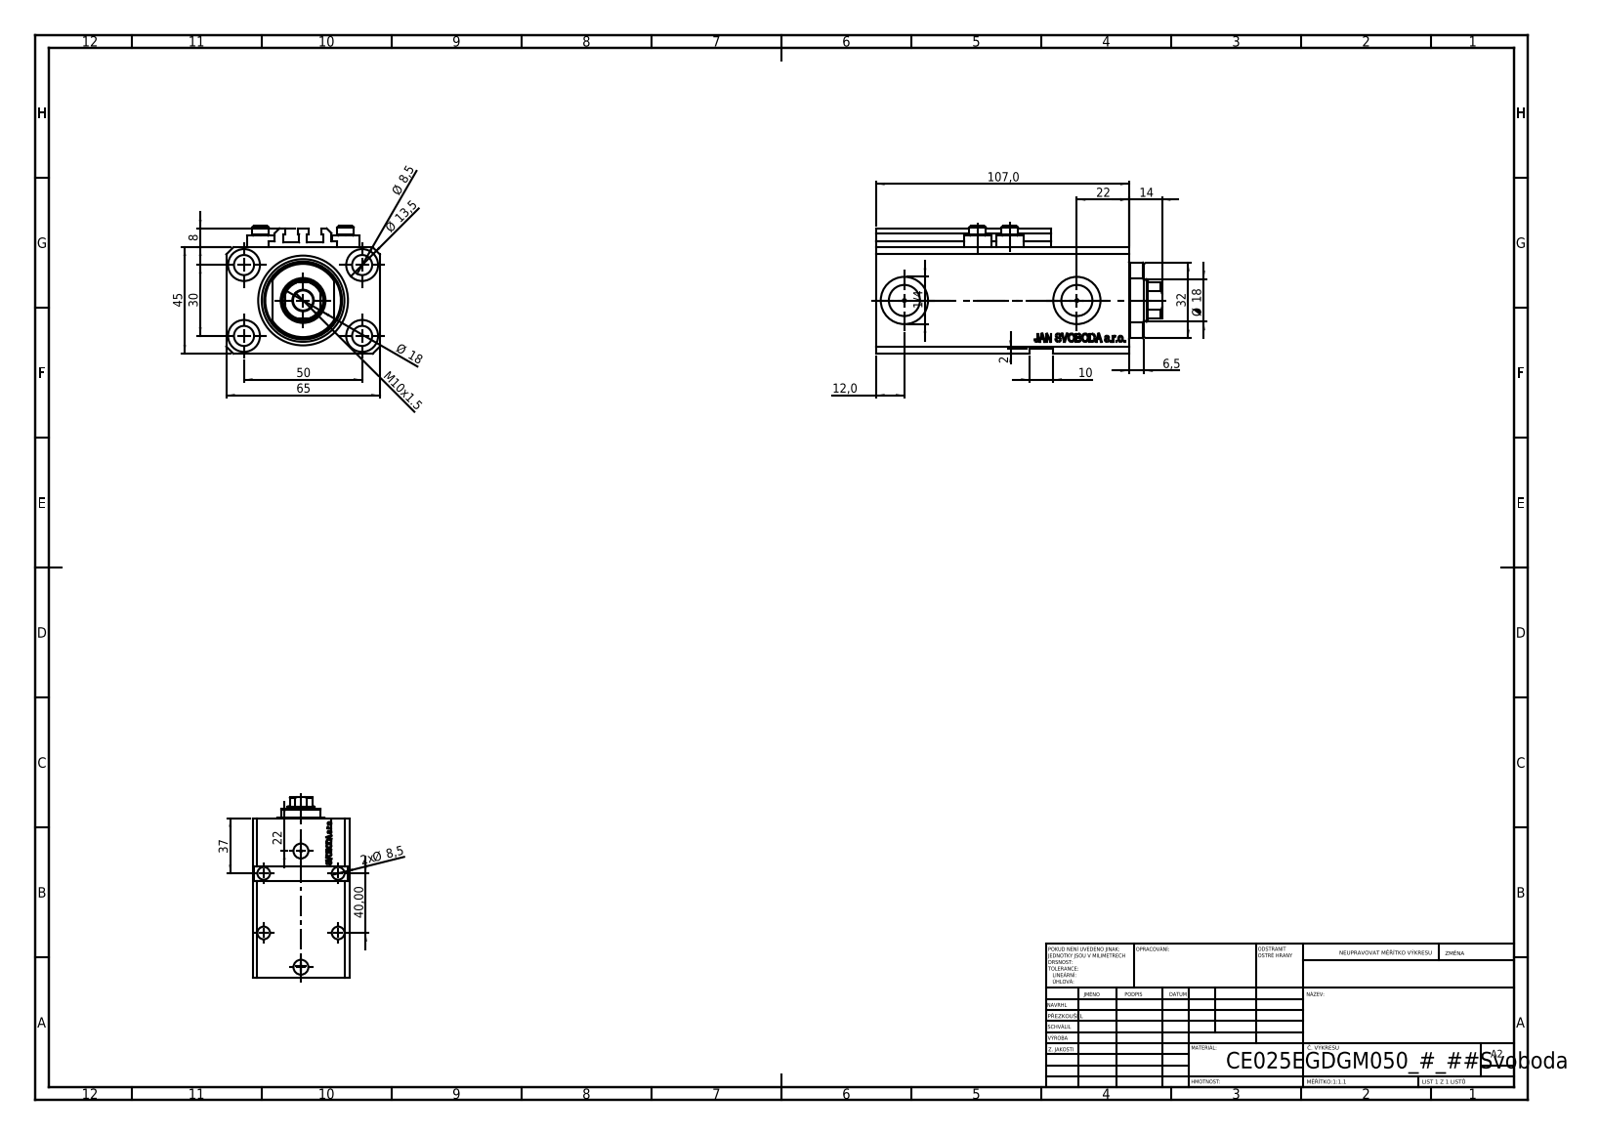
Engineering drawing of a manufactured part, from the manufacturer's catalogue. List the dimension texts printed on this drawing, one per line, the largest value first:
107,0
65
50
45
40,00
37
32
30
22
22
Ø 18
Ø 18
14
Ø 13,5
12,0
M10x1.5
10
Ø 8,5
2x Ø 8,5
8
6,5
2
1/4
